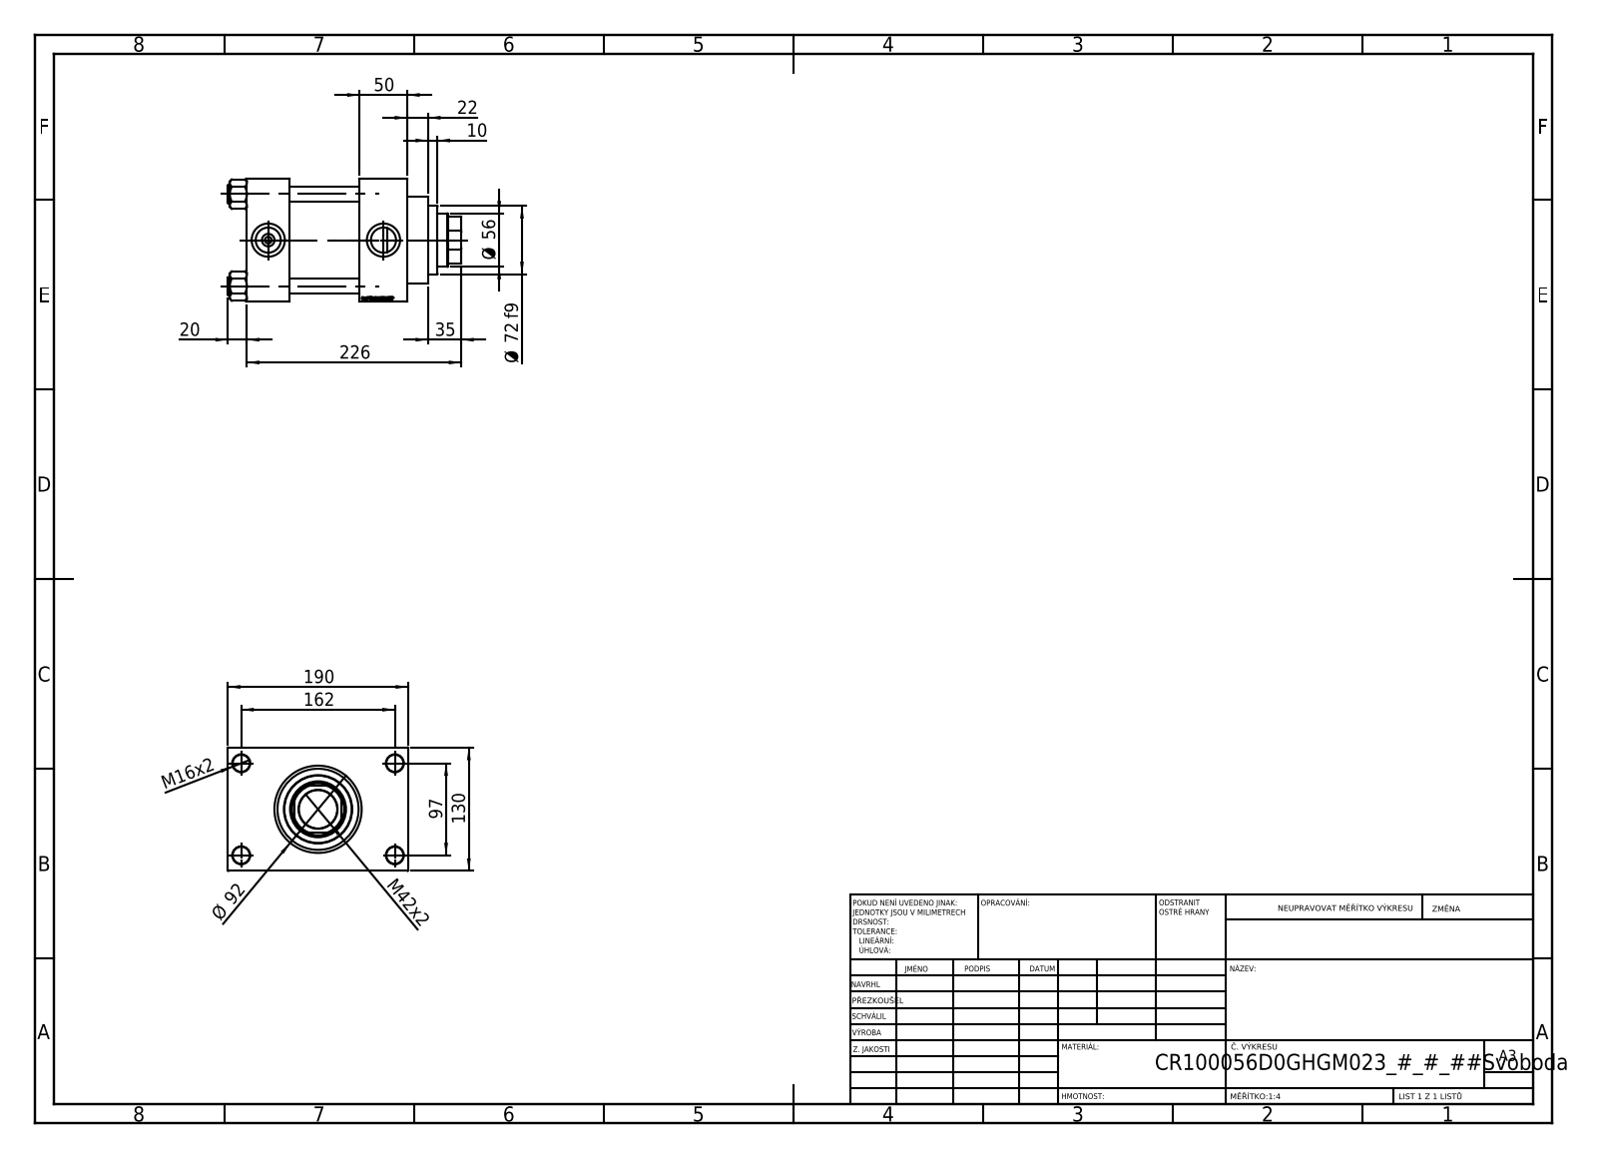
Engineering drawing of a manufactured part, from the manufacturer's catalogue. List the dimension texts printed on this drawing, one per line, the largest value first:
226
190
162
130
97
Ø 92
Ø 72 f9
Ø 56
50
M42x2
35
22
20
M16x2
10
